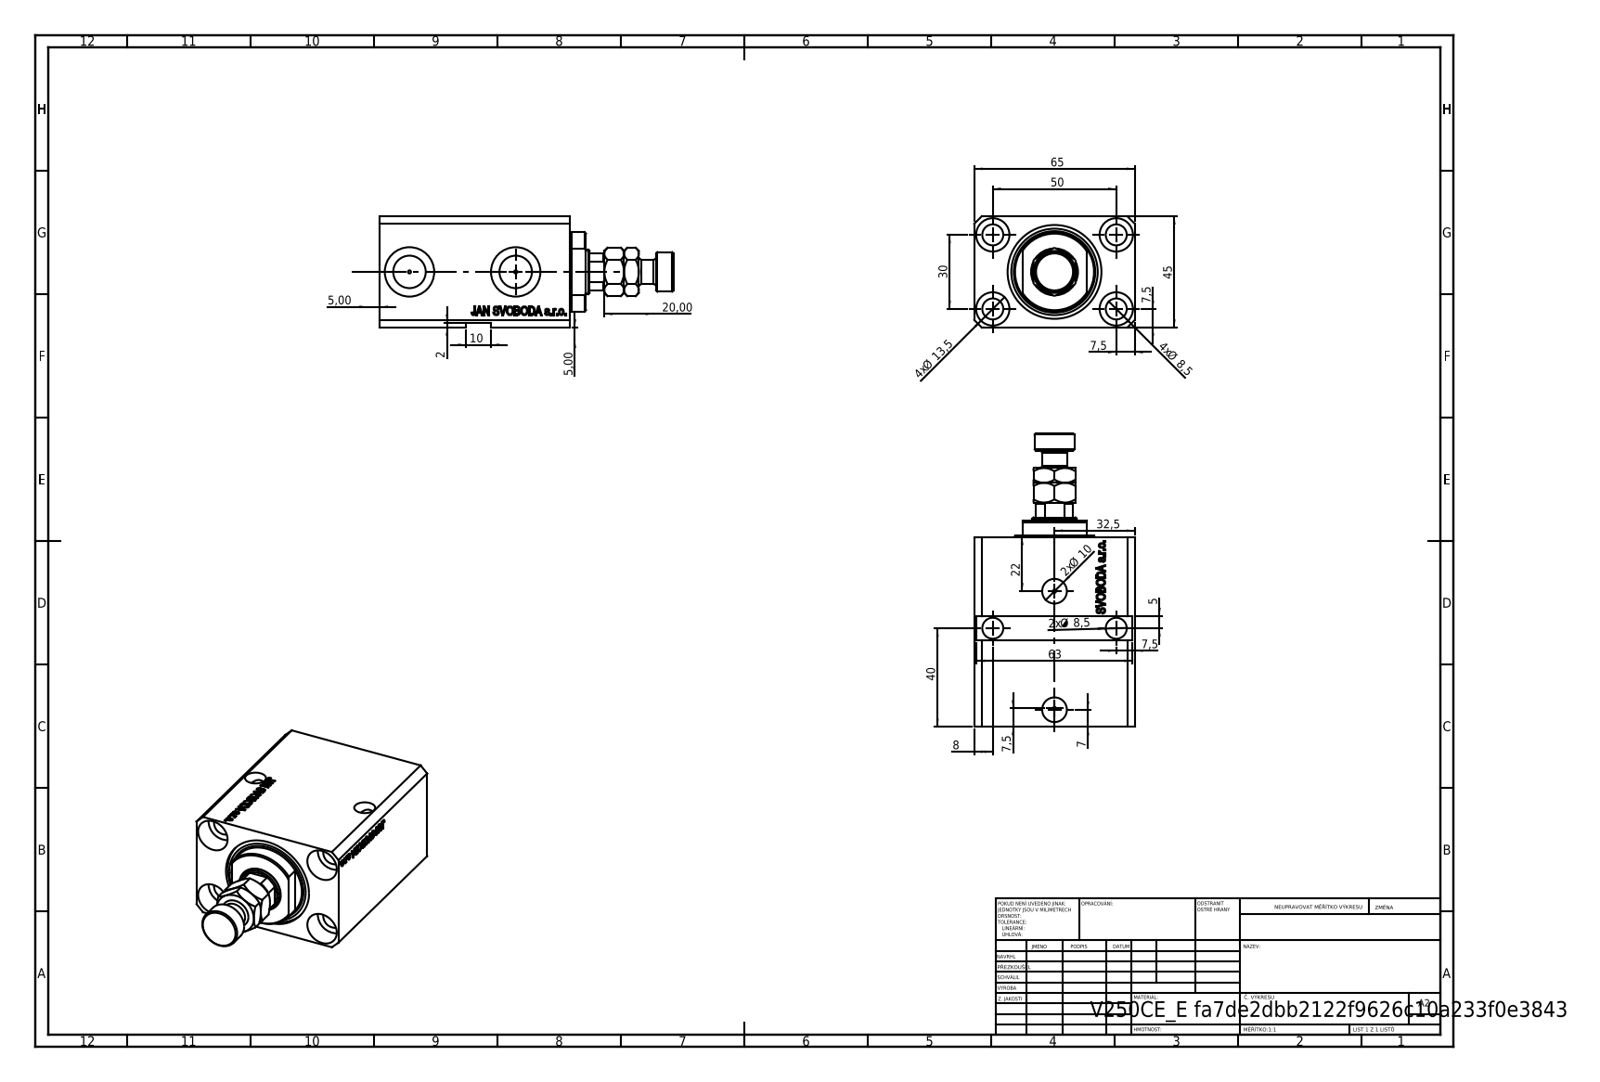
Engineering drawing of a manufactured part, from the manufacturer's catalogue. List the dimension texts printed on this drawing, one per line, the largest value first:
65
63
50
45
40
32,5
30
22
20,00
4x Ø 13,5
10
2x Ø 10
4x Ø 8,5
2x Ø 8,5
8
7,5
7,5
7,5
7,5
7
5,00
5,00
5
2
